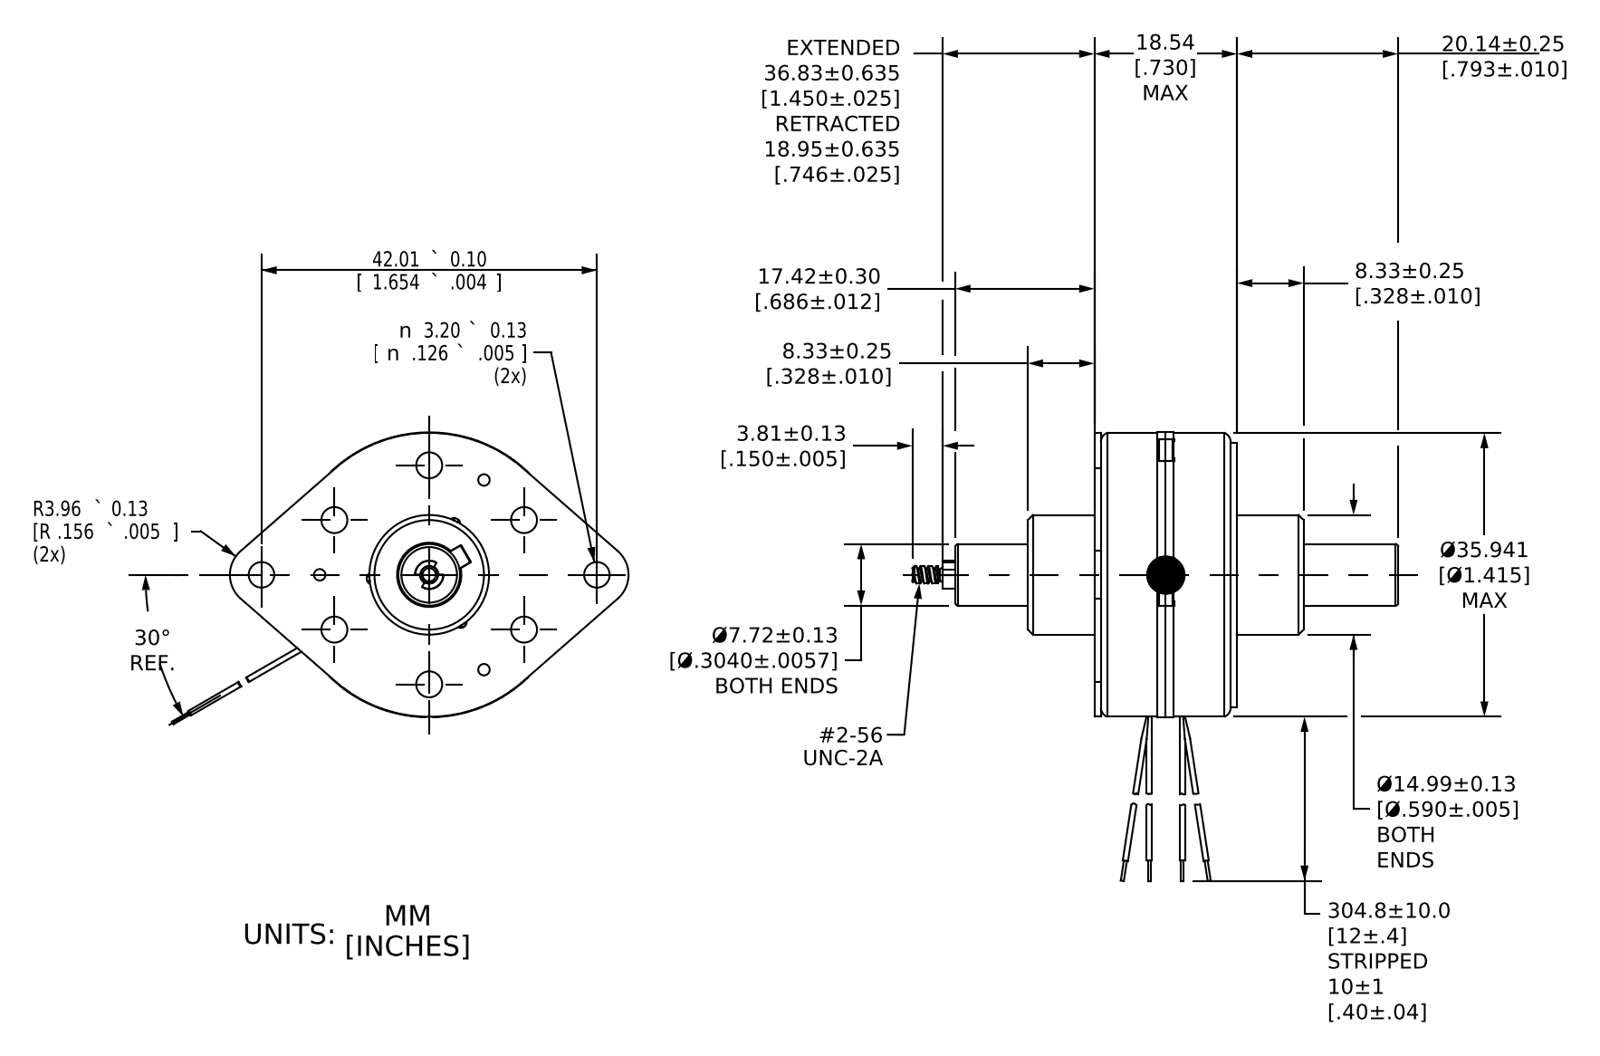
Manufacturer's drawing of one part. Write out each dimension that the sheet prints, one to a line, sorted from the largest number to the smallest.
42.01 ` 0.10 [ 1.654 ` .004 ]
EXTENDED 36.83±0.635 [1.450±.025] RETRACTED 18.95±0.635 [.746±.025]
Ø35.941 [Ø1.415] MAX
30° REF.
20.14±0.25 [.793±.010]
18.54 [.730] MAX
17.42±0.30 [.686±.012]
8.33±0.25 [.328±.010]
8.33±0.25 [.328±.010]
Ø7.72±0.13 [Ø.3040±.0057] BOTH ENDS
R3.96 ` 0.13 [R .156 ` .005 ] (2x)
3.81±0.13 [.150±.005]
n 3.20 ` 0.13 [ n .126 ` .005 ] (2x)
